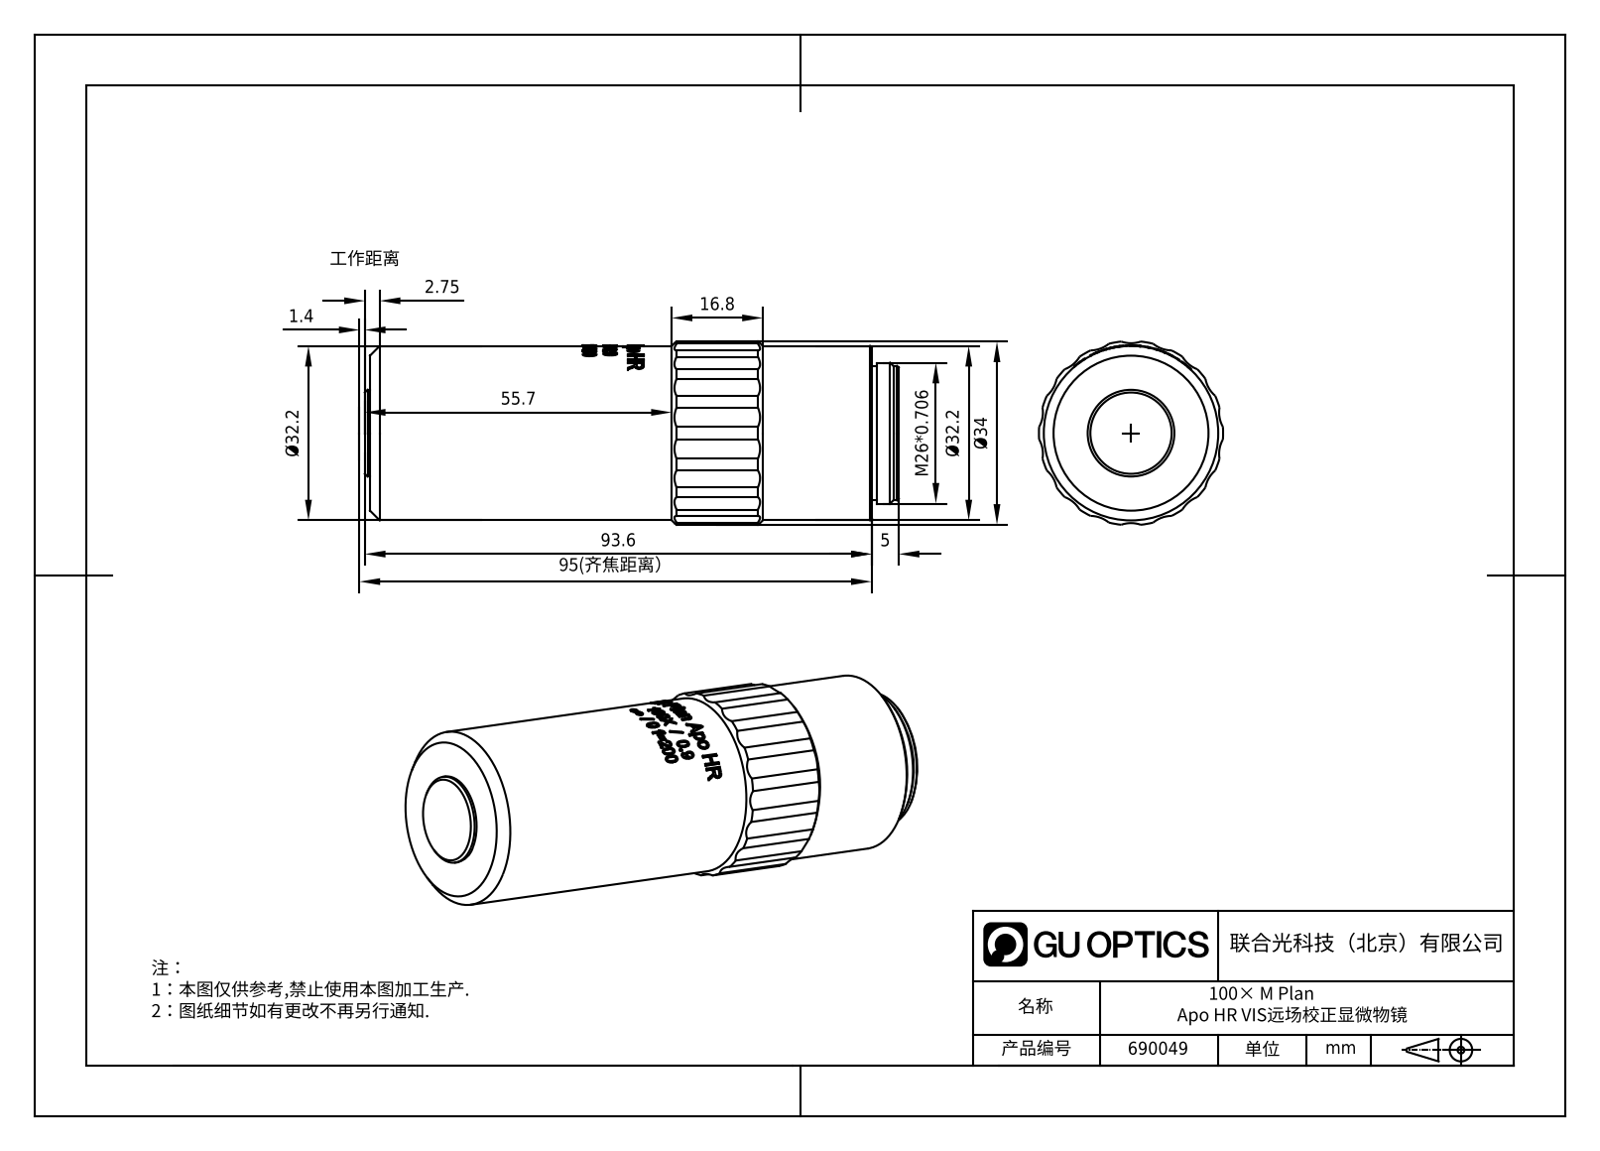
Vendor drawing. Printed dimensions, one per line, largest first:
95(齐焦距离）
93.6
55.7
Ø34
Ø32.2
Ø32.2
M26*0.706
16.8
5
2.75
1.4
